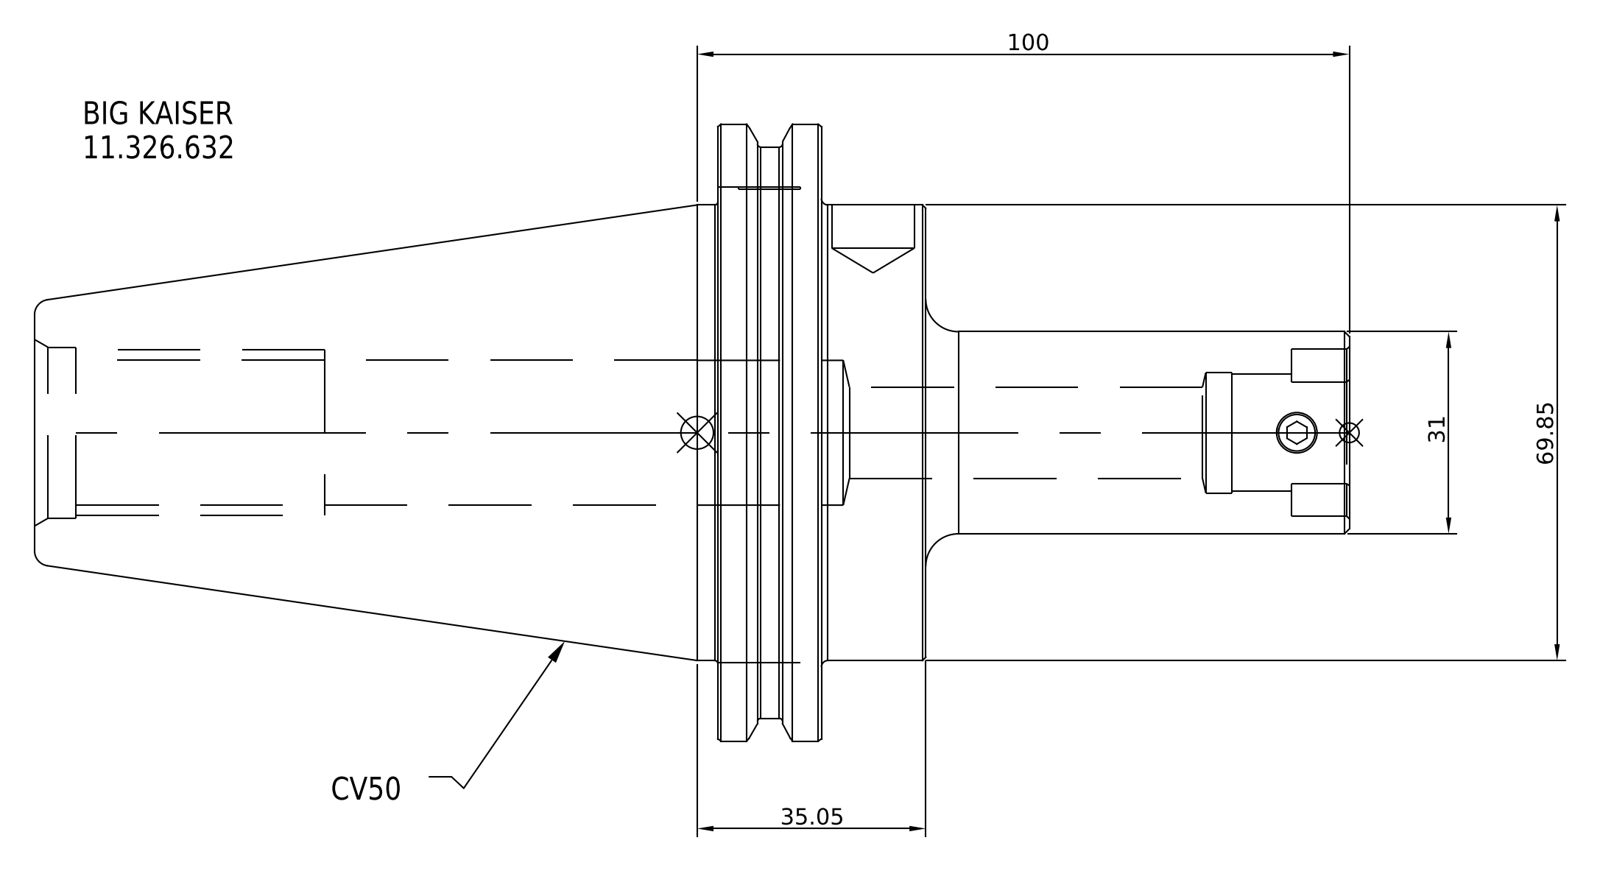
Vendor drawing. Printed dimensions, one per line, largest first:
100
69.85
35.05
31
